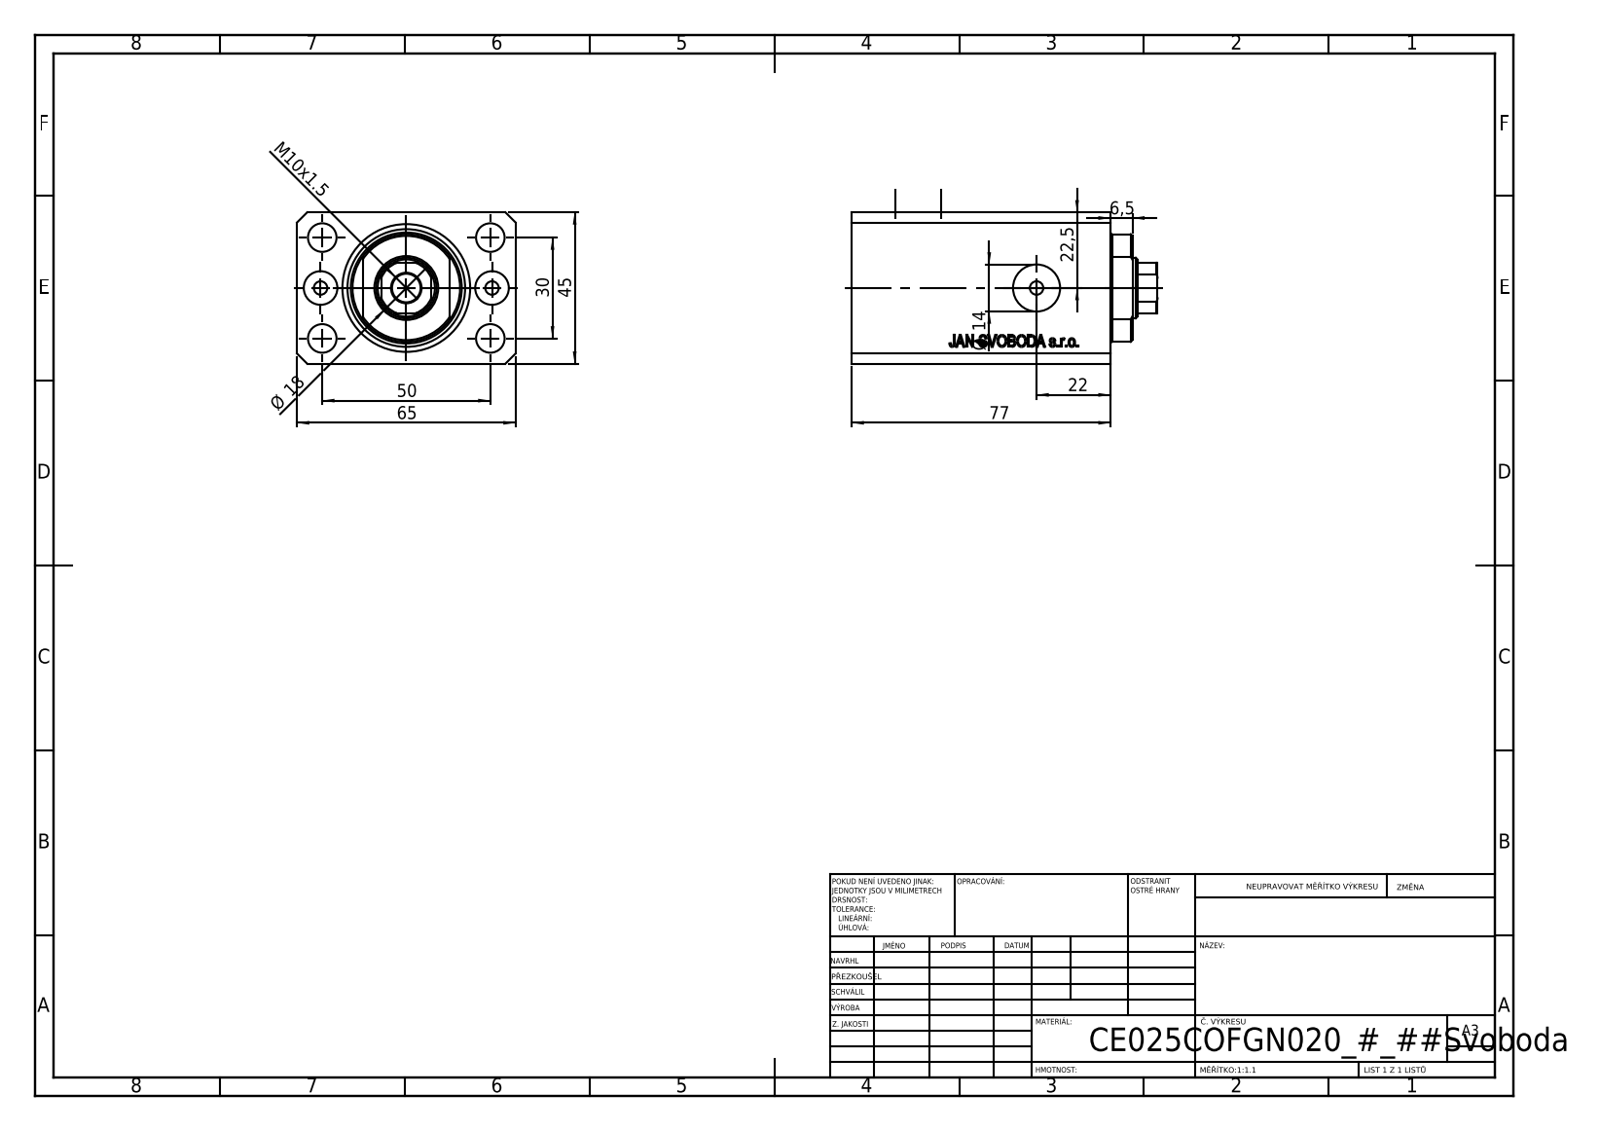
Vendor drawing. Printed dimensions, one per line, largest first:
77
65
50
45
30
22,5
22
Ø 18
Ø 14
M10x1.5
6,5
